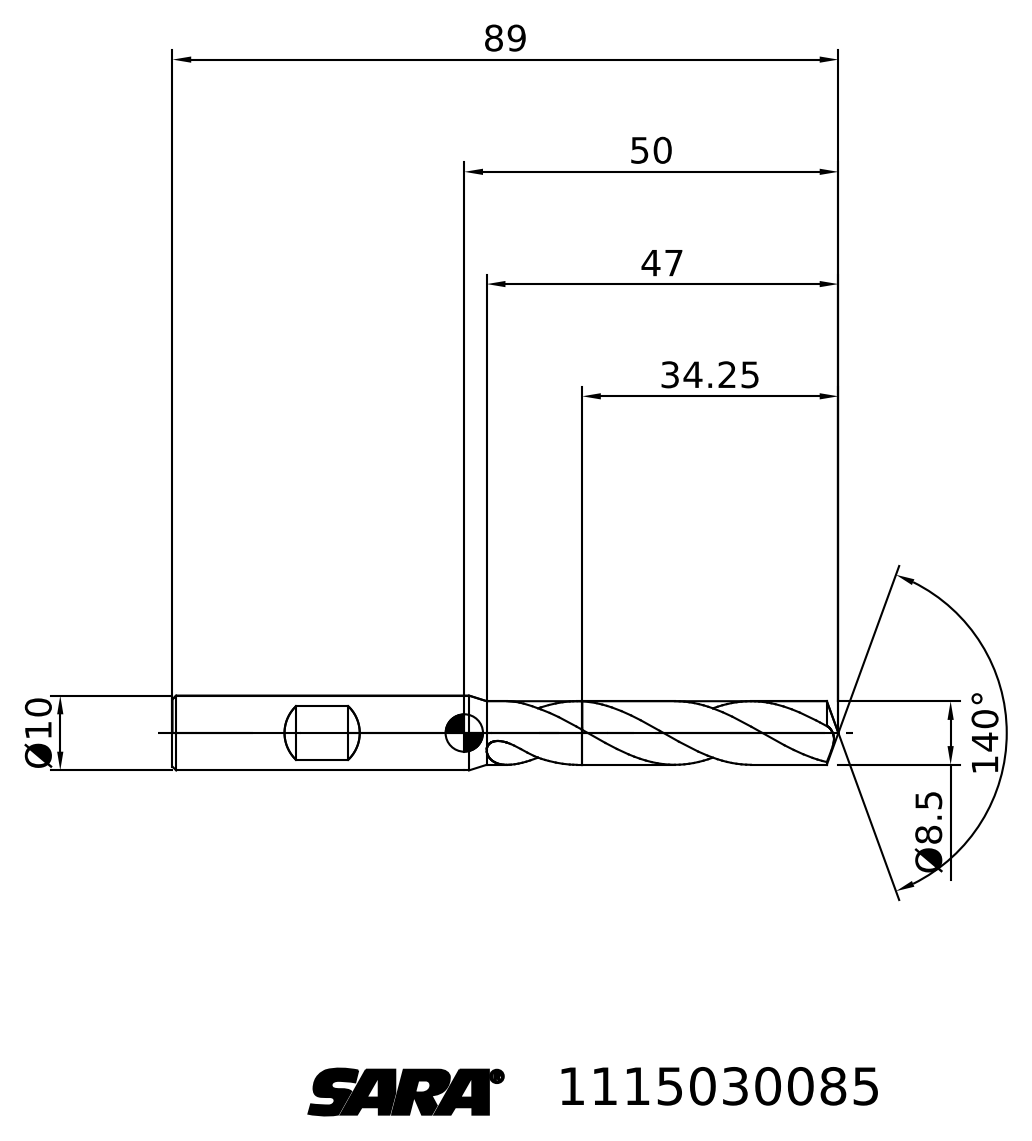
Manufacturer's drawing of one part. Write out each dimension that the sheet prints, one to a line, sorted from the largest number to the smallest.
140°
89
50
47
34.25
Ø10
Ø8.5
